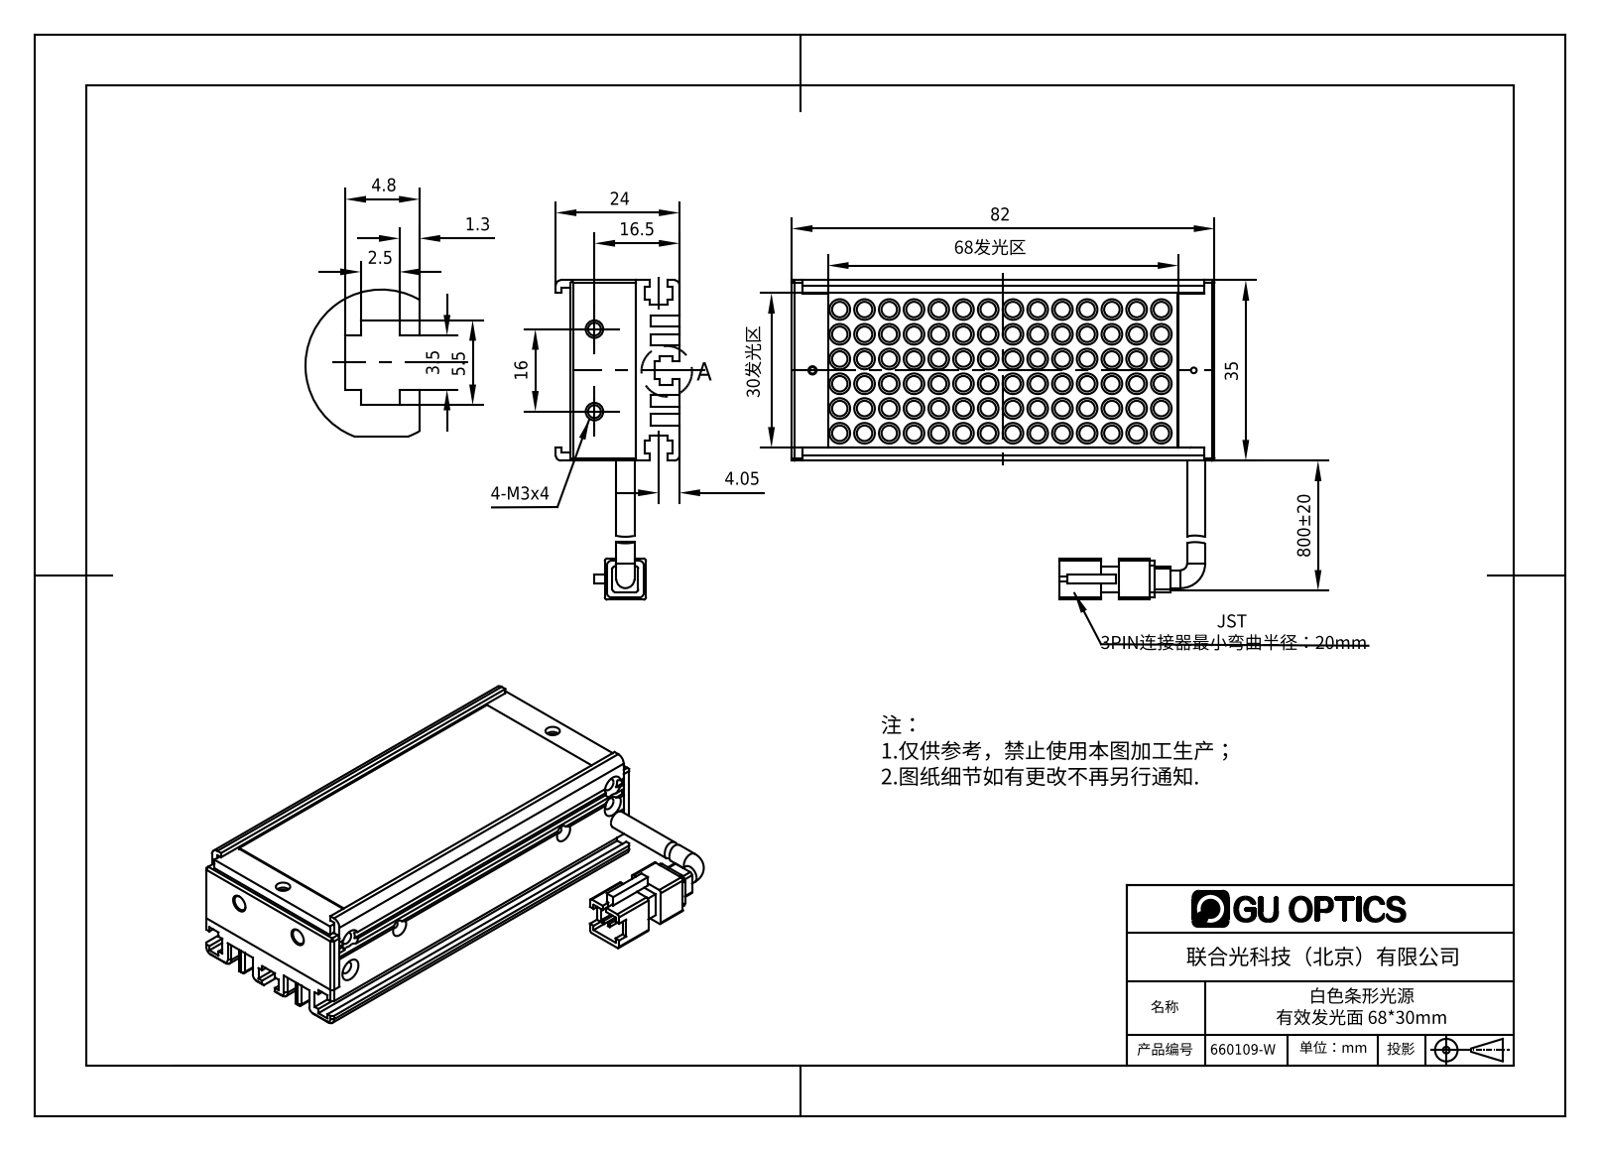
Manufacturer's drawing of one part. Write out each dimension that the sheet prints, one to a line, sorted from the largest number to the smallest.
800±20
82
68发光区
35
30发光区
24
16.5
16
5.5
4.8
4.05
3.5
2.5
1.3
